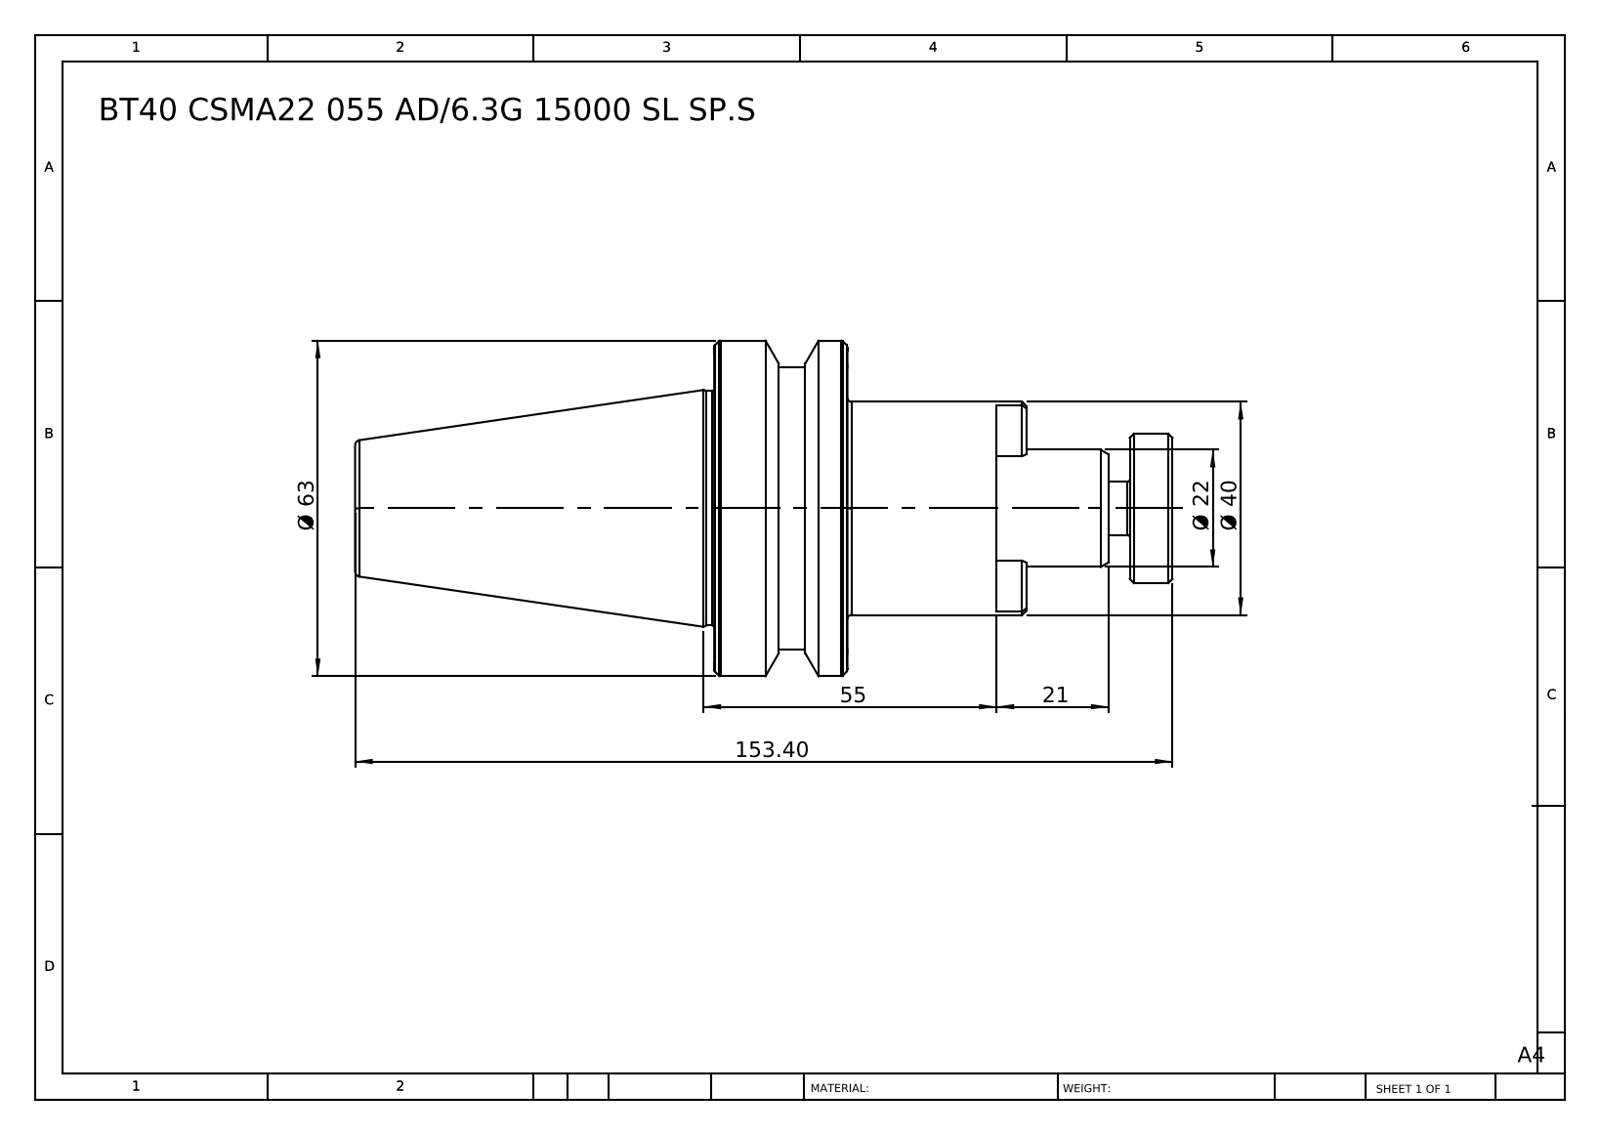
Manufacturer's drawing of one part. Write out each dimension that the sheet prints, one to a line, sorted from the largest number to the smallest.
153.40
Ø 63
55
Ø 40
Ø 22
21
